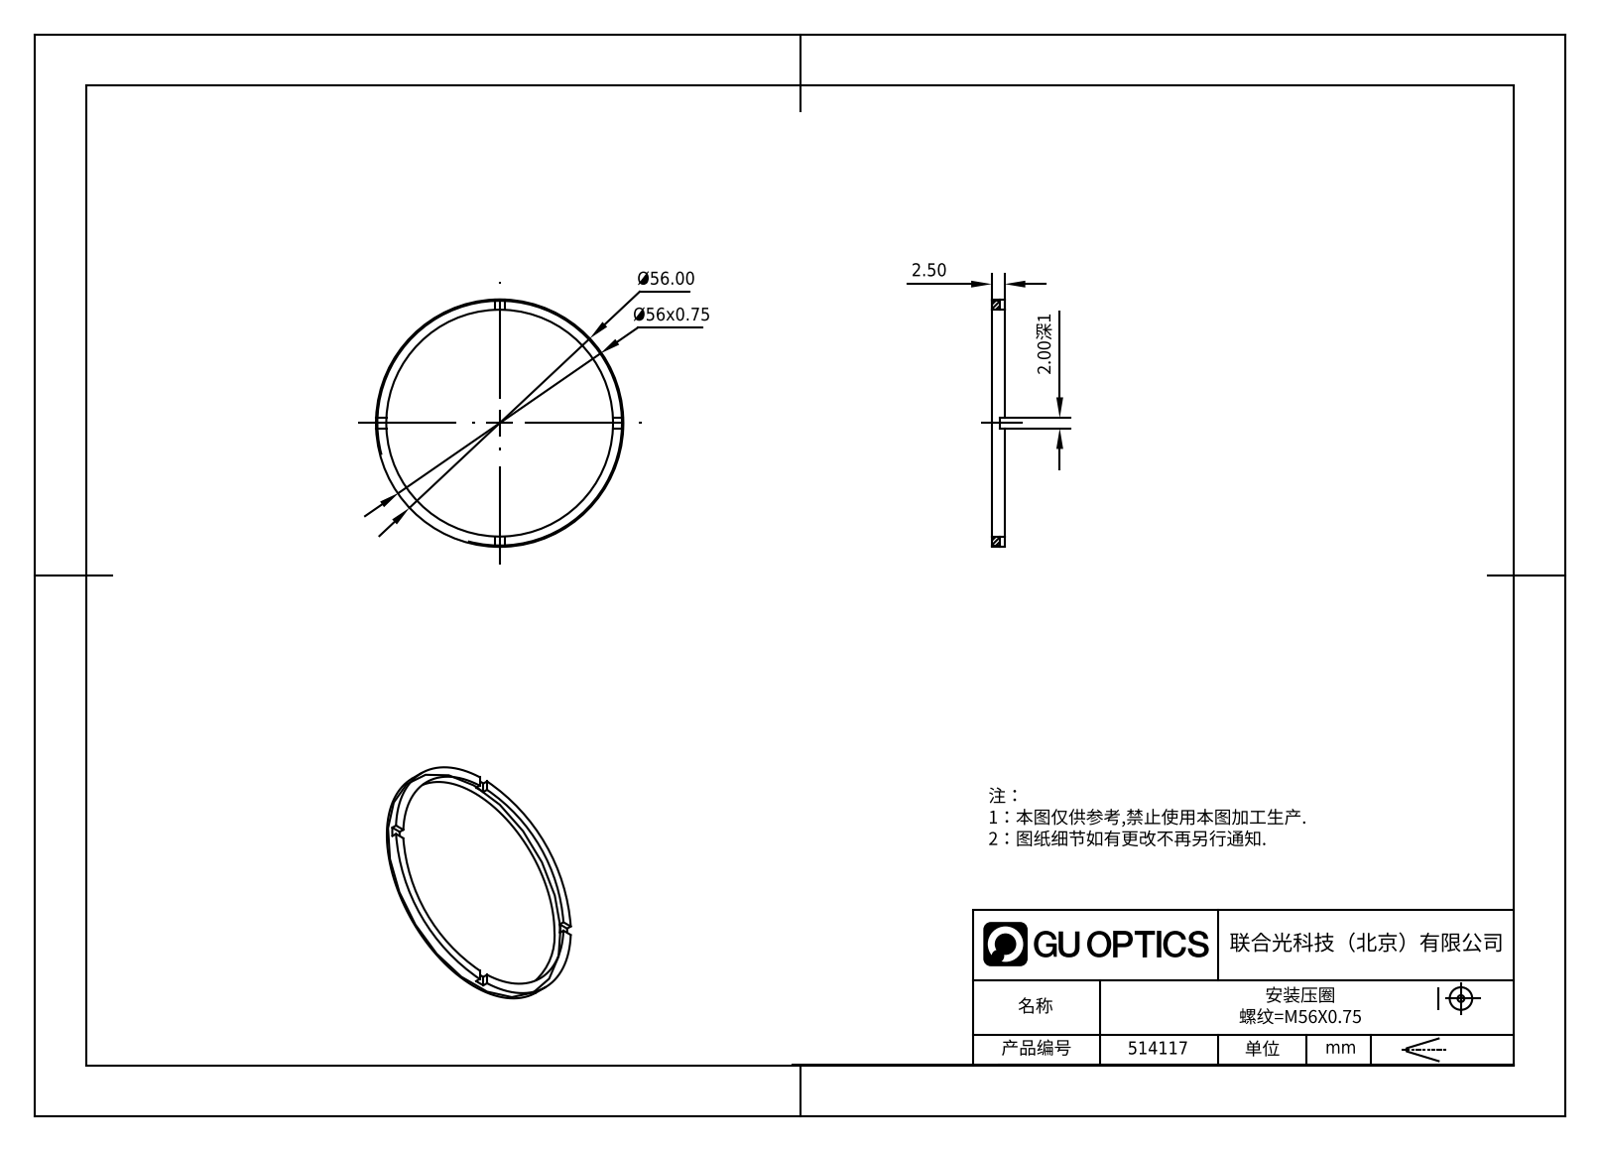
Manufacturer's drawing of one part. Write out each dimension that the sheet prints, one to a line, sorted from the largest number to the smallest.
Ø56.00
Ø56x0.75
2.50
2.00深1
